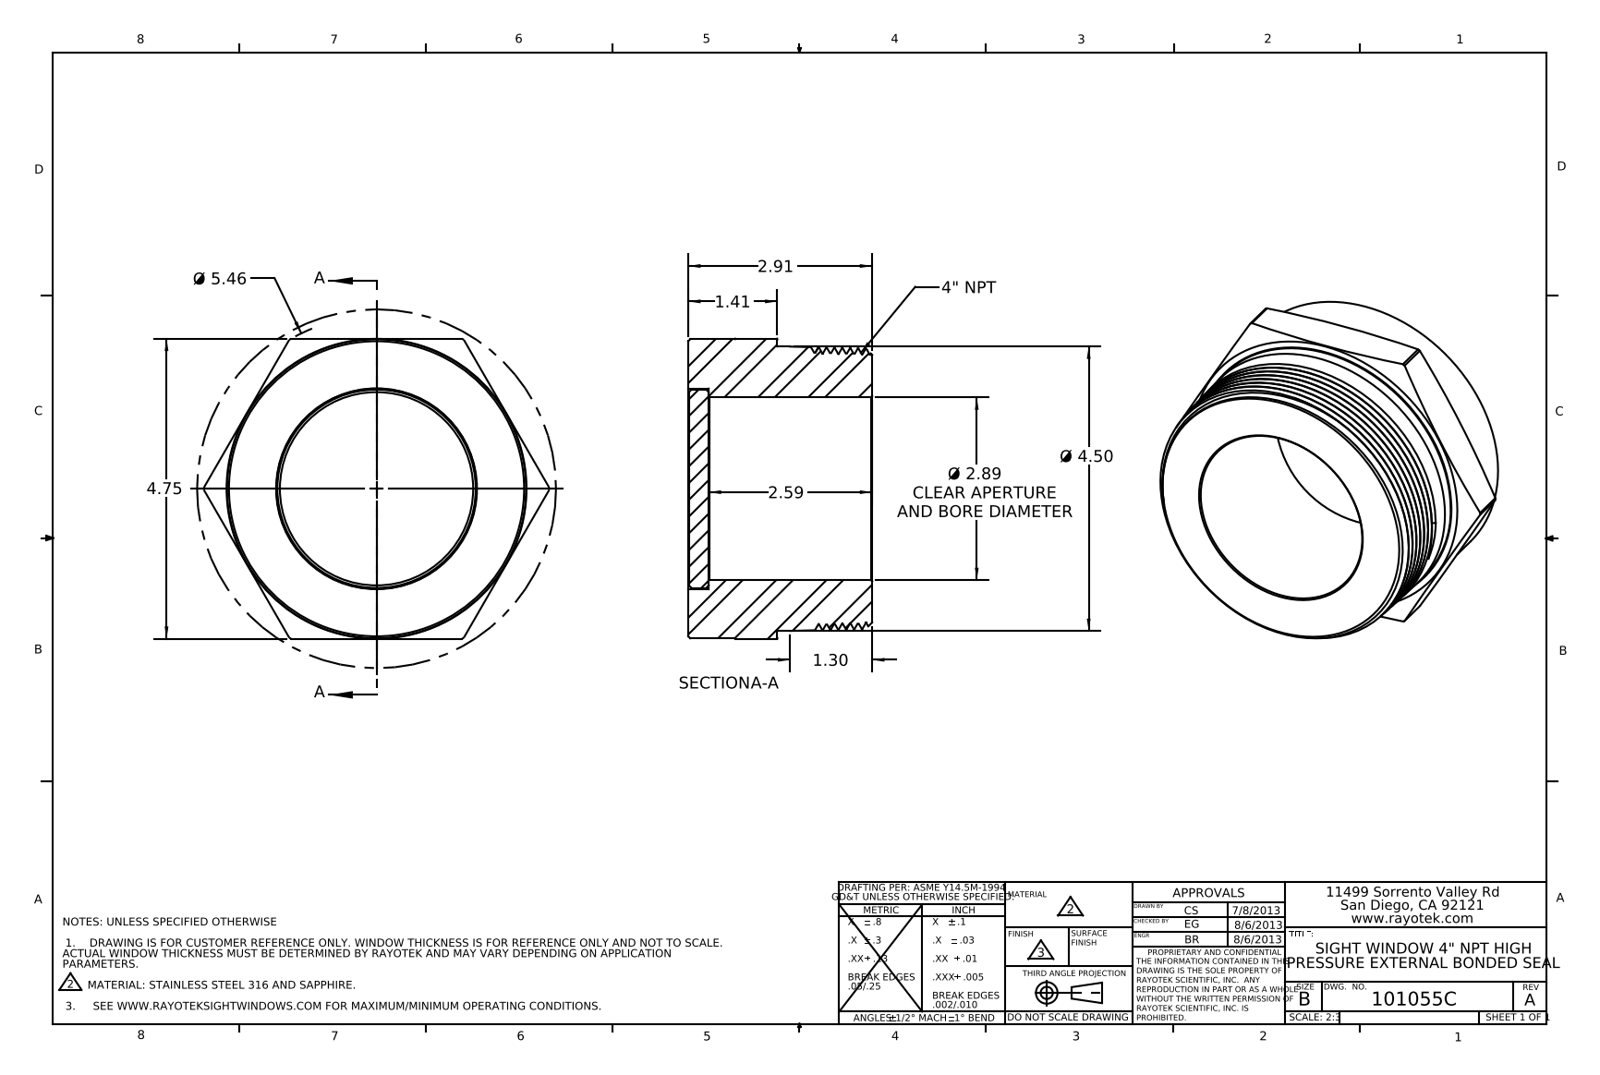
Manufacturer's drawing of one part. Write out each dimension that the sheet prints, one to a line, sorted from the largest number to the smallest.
Ø 5.46
4.75
Ø 4.50
2.91
Ø 2.89 CLEAR APERTURE AND BORE DIAMETER
2.59
1.41
1.30
